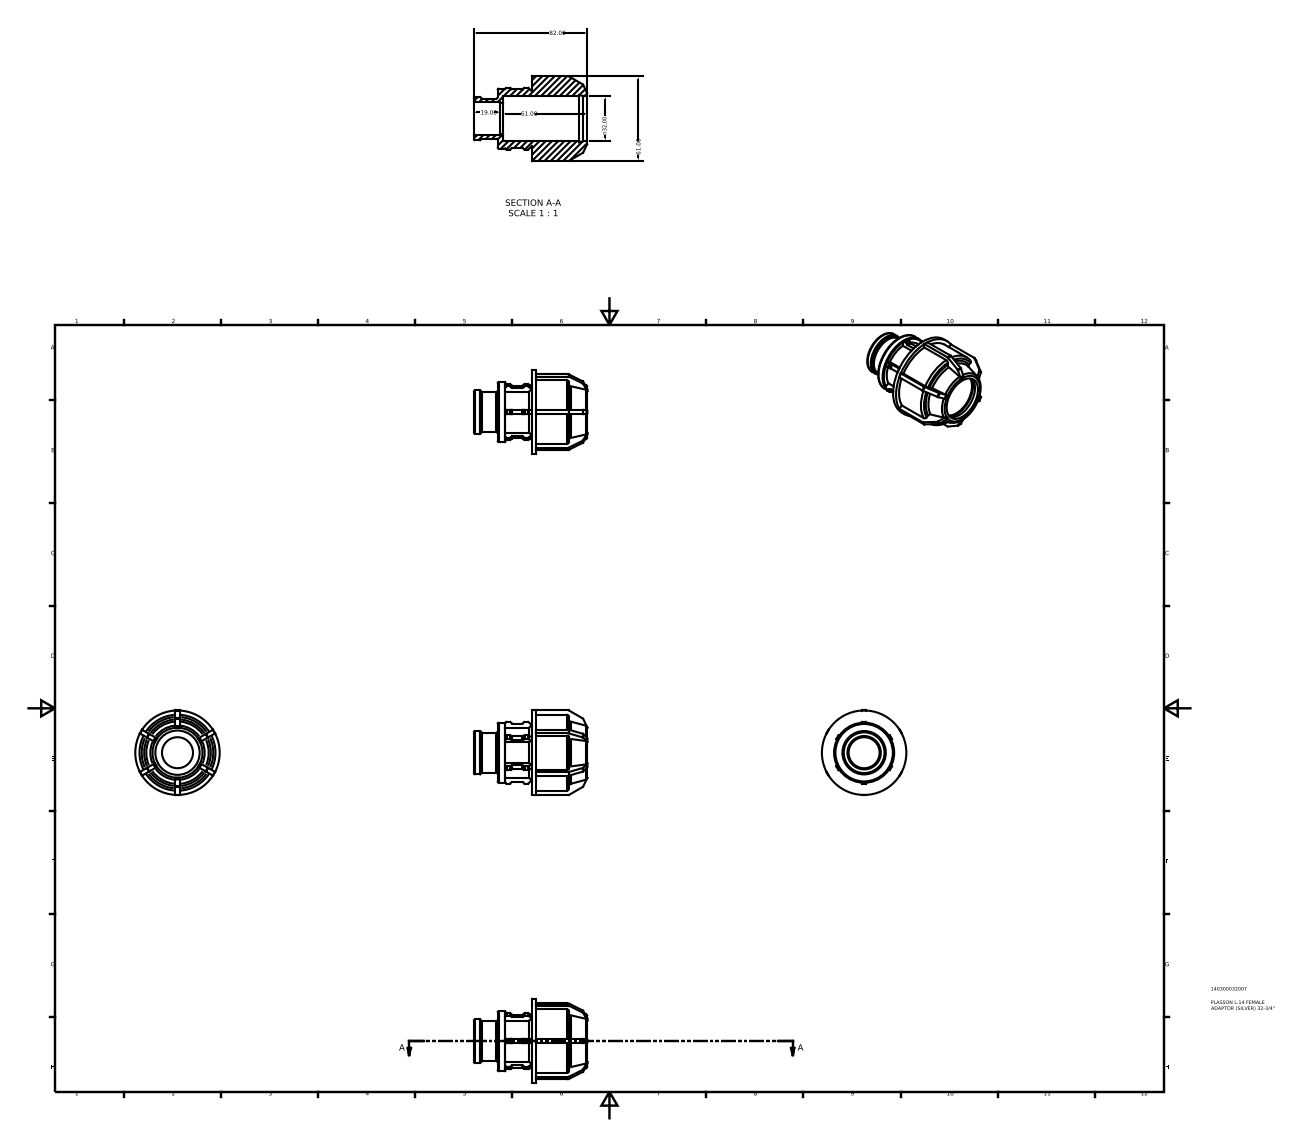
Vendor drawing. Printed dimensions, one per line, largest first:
82.00
61.00
61.00
n32.00
19.00
